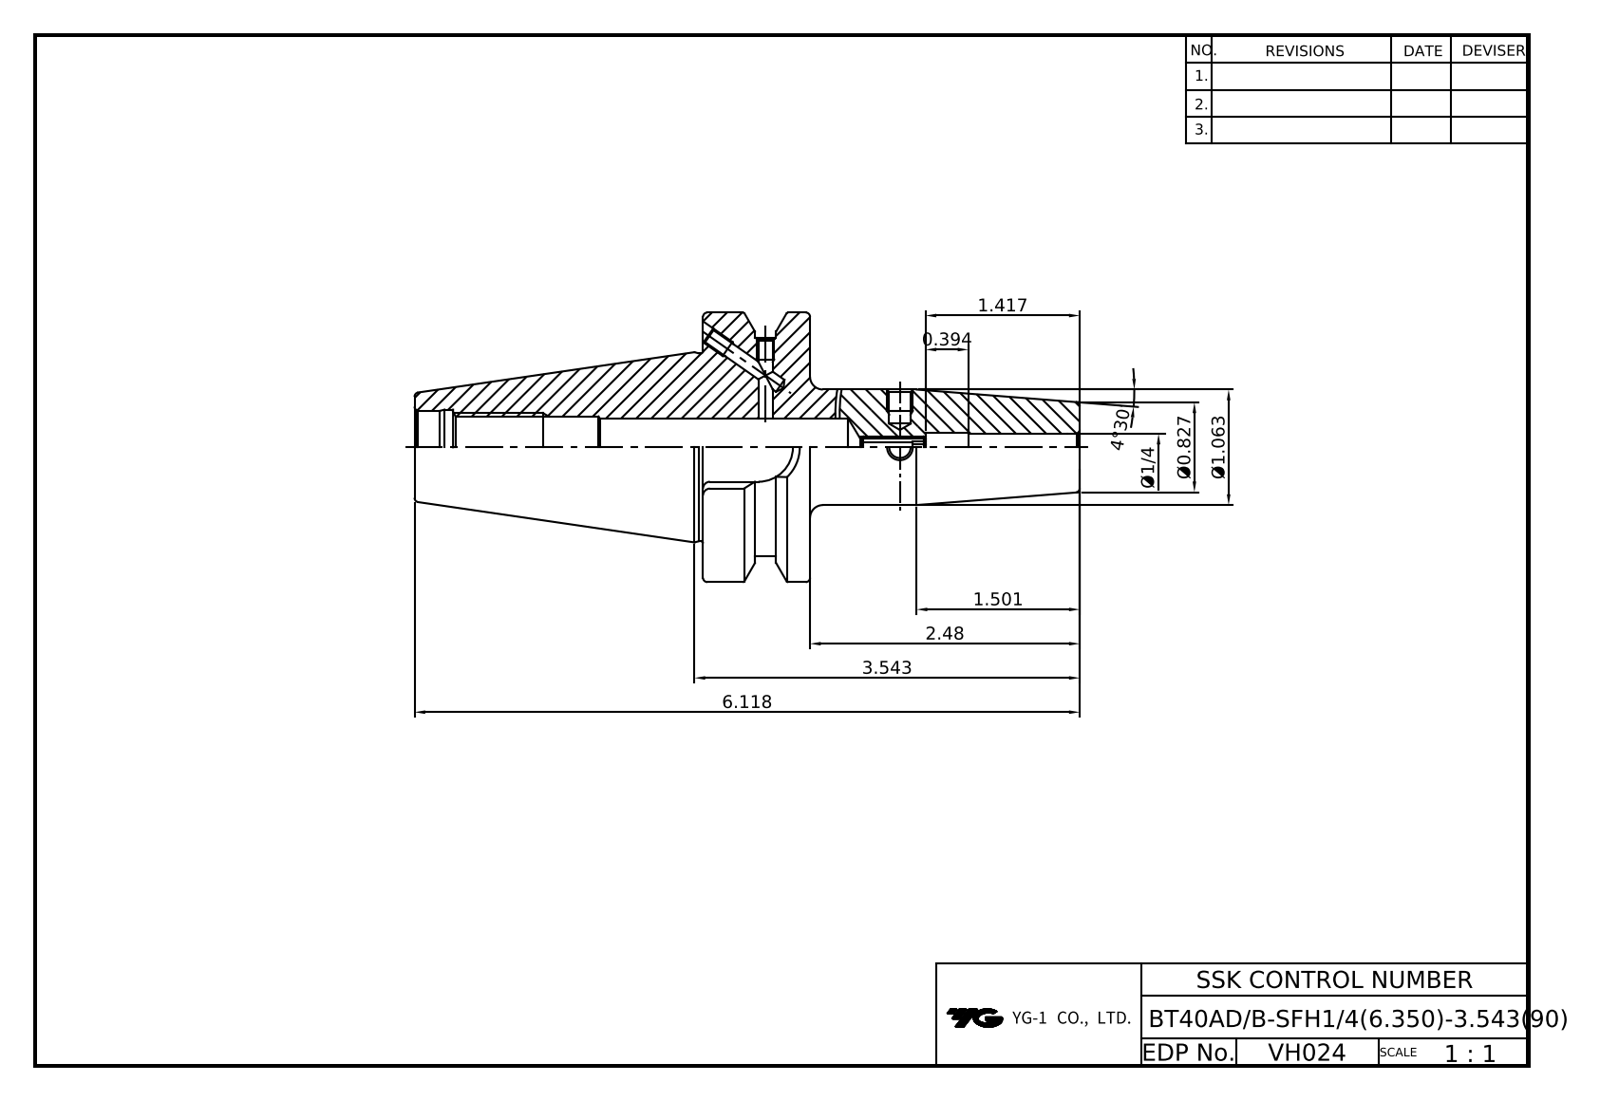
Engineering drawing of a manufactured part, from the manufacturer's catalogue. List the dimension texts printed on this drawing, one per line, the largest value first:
6.118
4°30'
3.543
2.48
1.501
1.417
Ø1.063
Ø0.827
0.394
